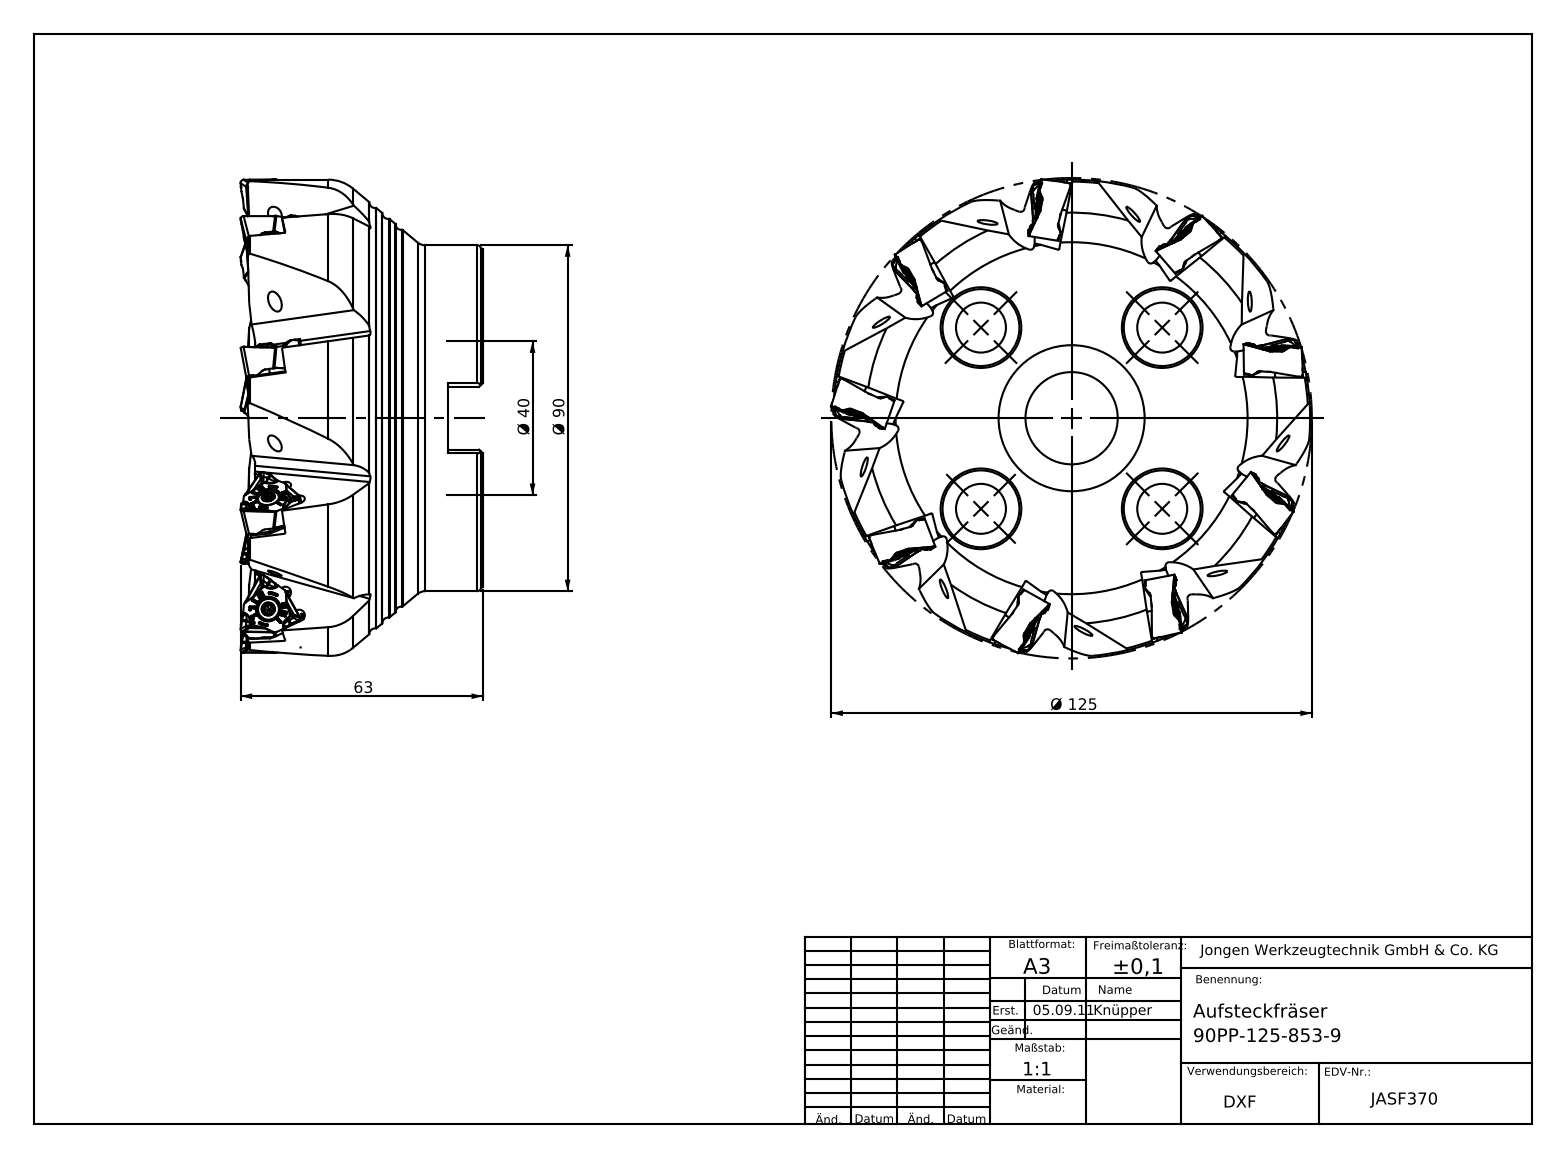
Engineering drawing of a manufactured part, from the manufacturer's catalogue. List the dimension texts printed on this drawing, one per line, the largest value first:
Ø 125
Ø 90
63
Ø 40
